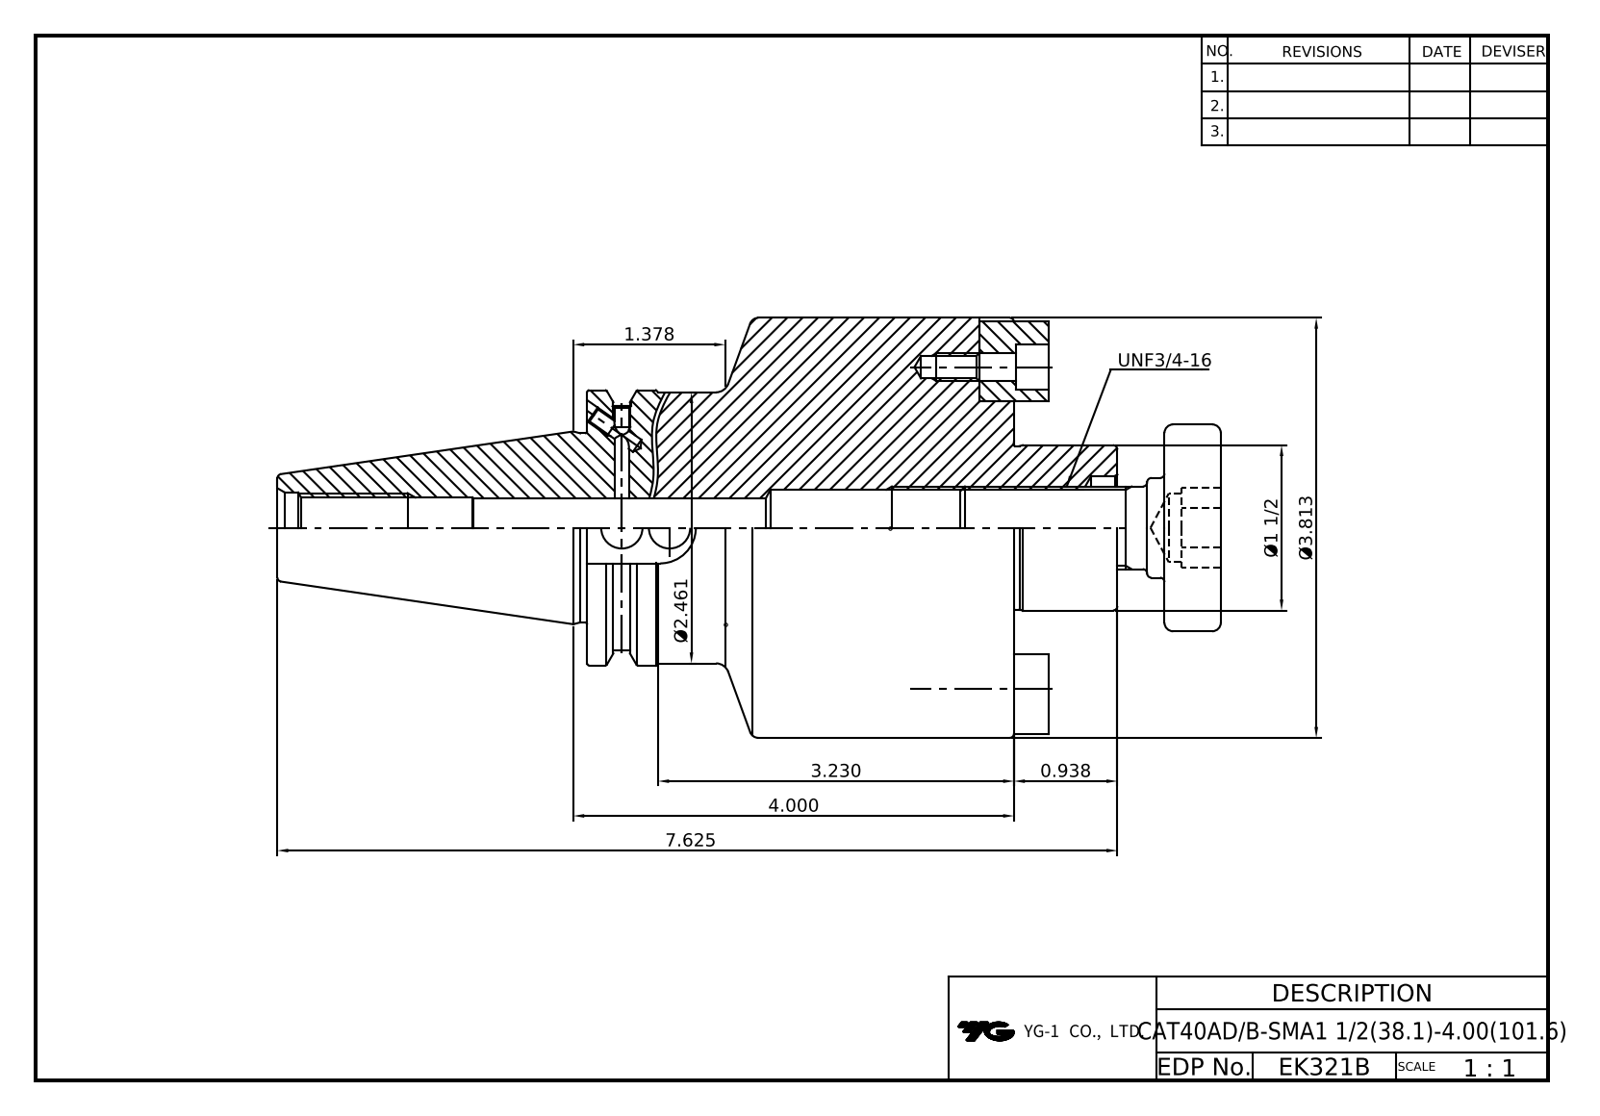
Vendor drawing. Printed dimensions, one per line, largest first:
7.625
4.000
Ø3.813
3.230
Ø2.461
Ø1 1/2
1.378
0.938
